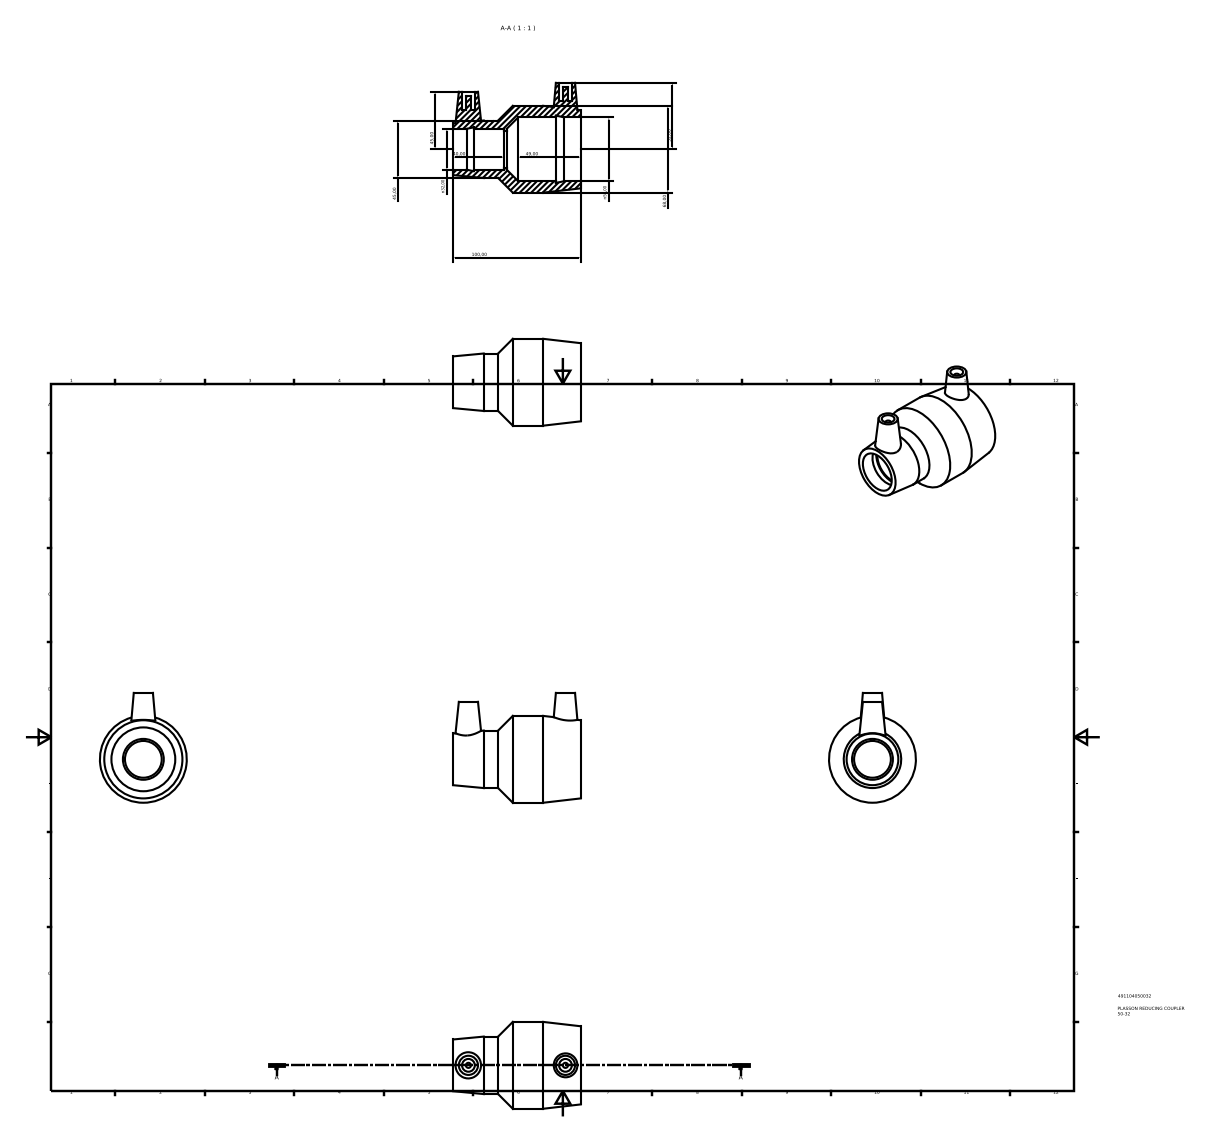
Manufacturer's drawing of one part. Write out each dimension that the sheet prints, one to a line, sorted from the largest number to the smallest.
100,00
68,00
52,00
n50,00
49,00
45,00
45,00
40,00
n32,00
